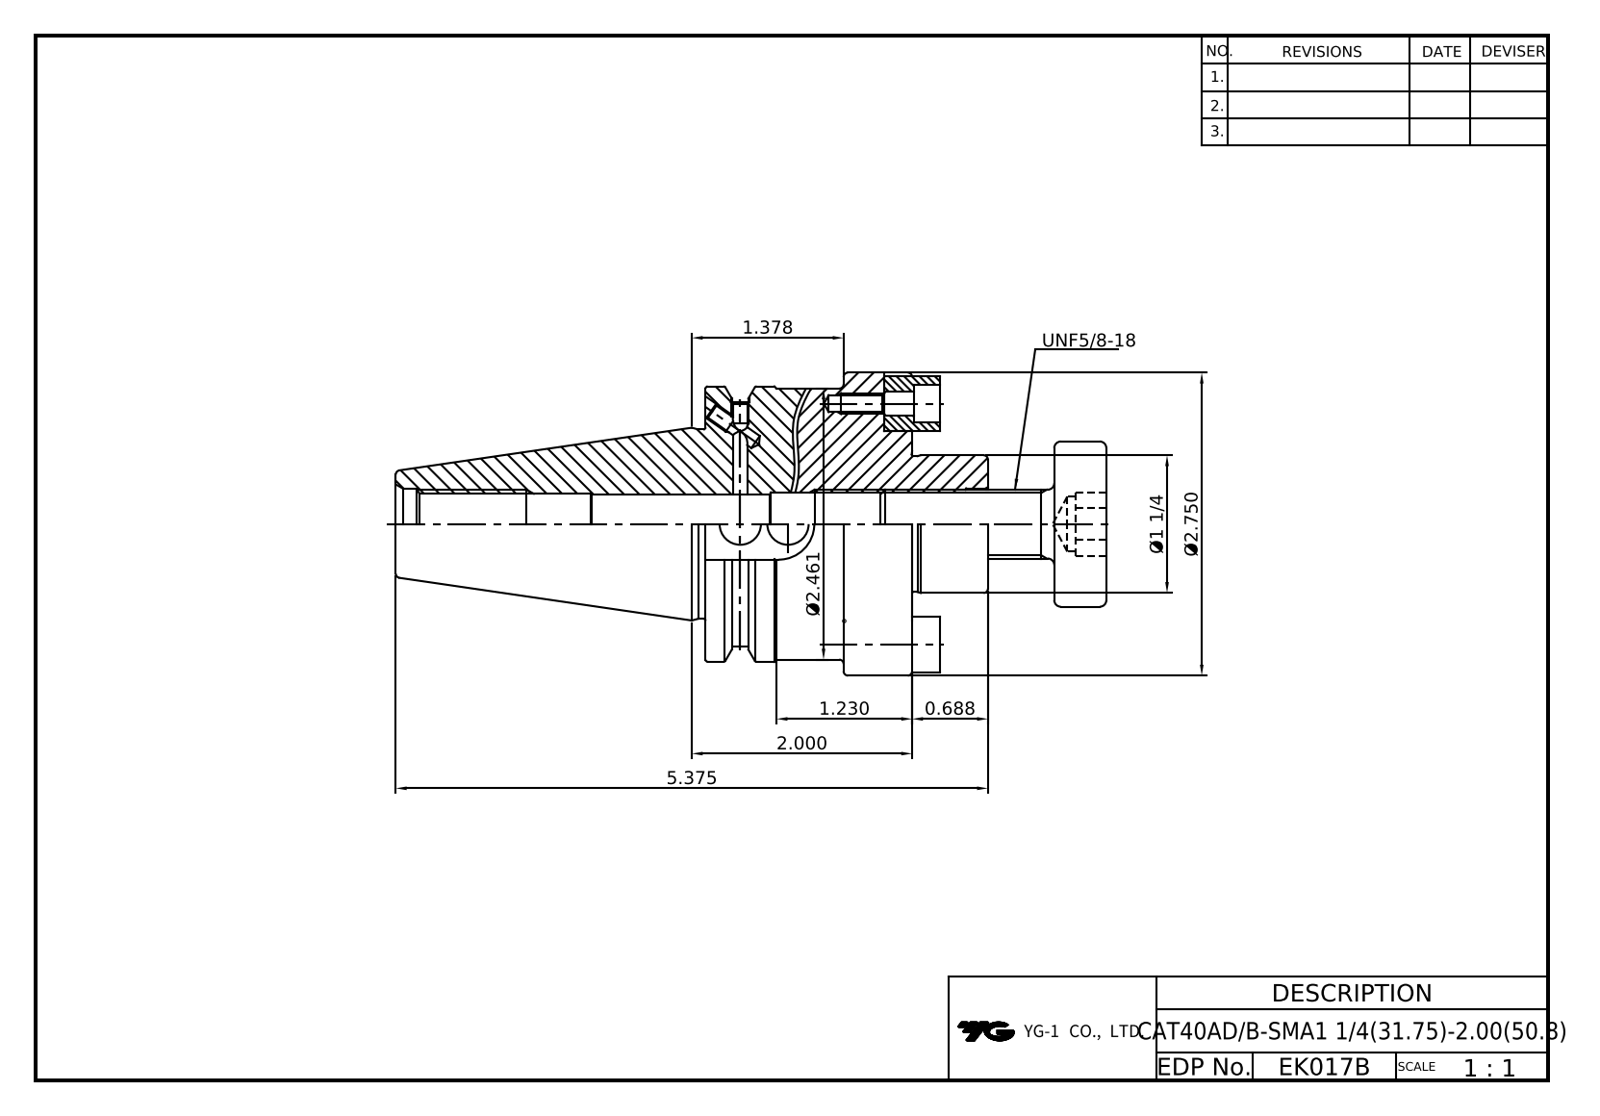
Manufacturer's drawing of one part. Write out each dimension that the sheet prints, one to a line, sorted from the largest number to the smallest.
5.375
Ø2.750
Ø2.461
2.000
1.378
Ø1 1/4
1.230
0.688
